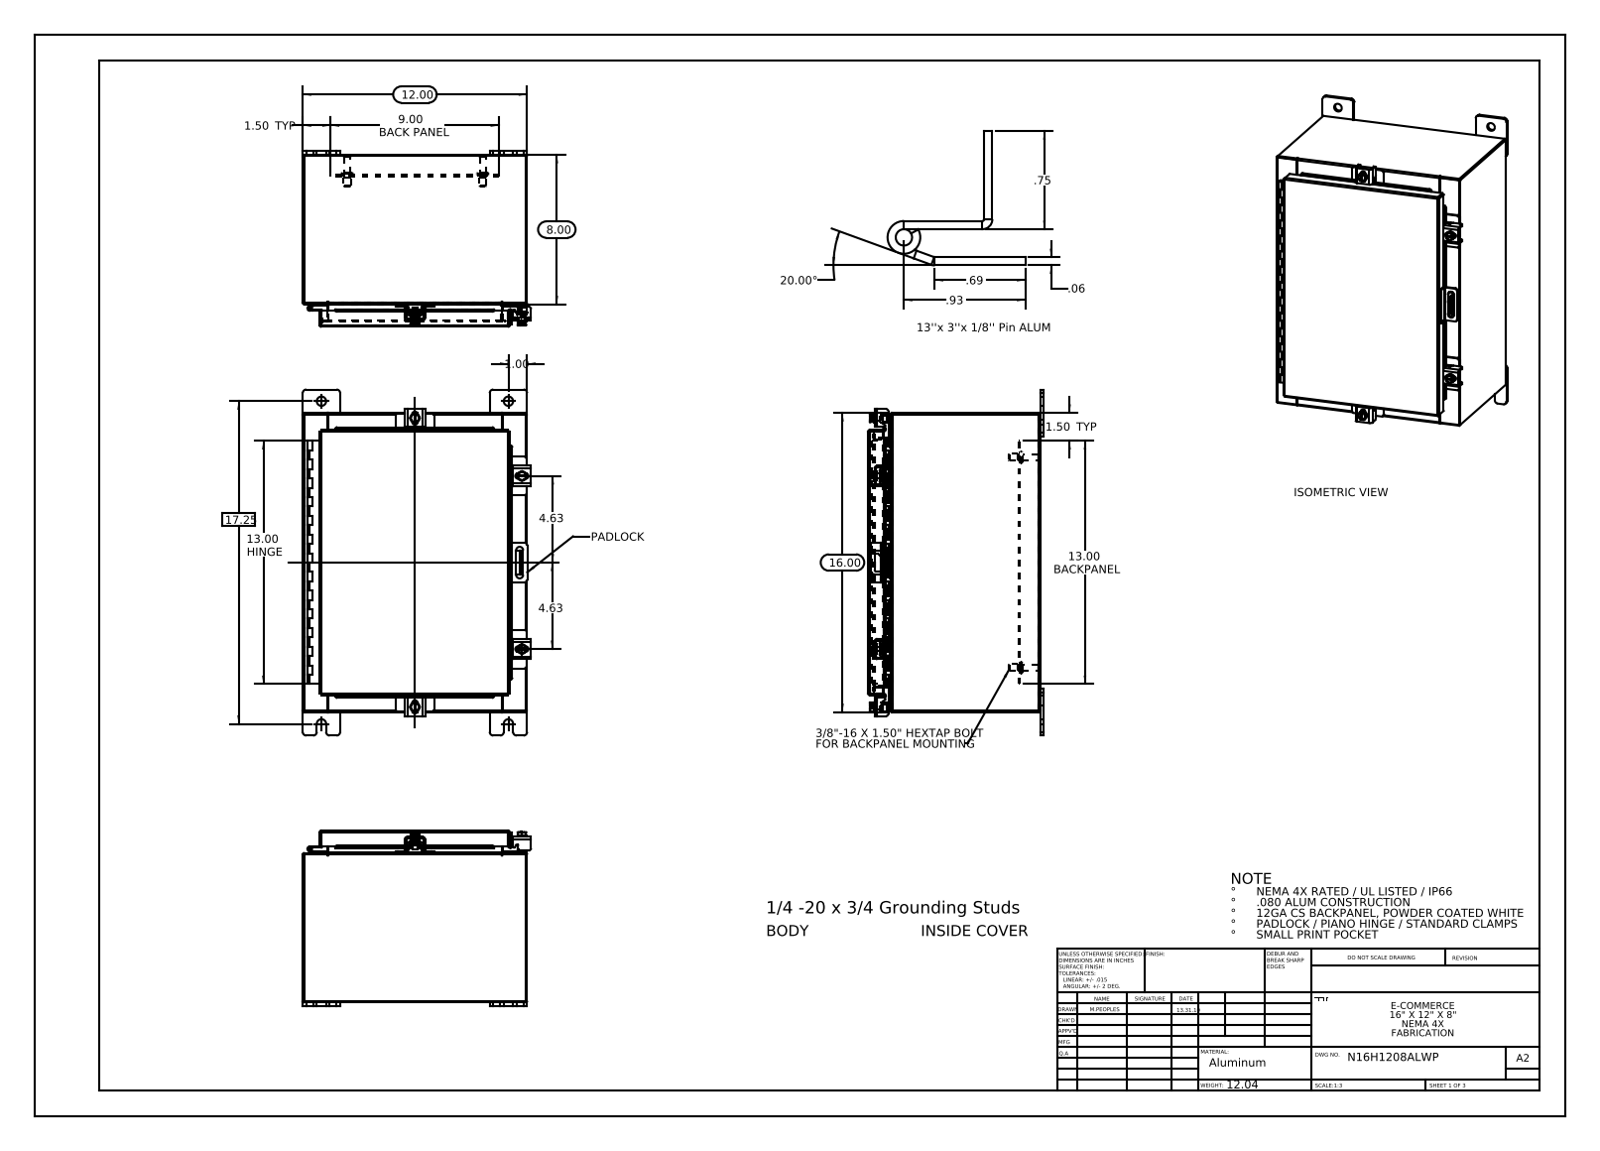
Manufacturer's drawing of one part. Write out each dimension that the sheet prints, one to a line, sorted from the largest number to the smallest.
20.00°
17.25
16.00
13.00 HINGE
13.00 BACKPANEL
12.00
9.00 BACK PANEL
8.00
4.63
4.63
1.50 TYP
1.50 TYP
1.00
.93
.75
.69
.06
